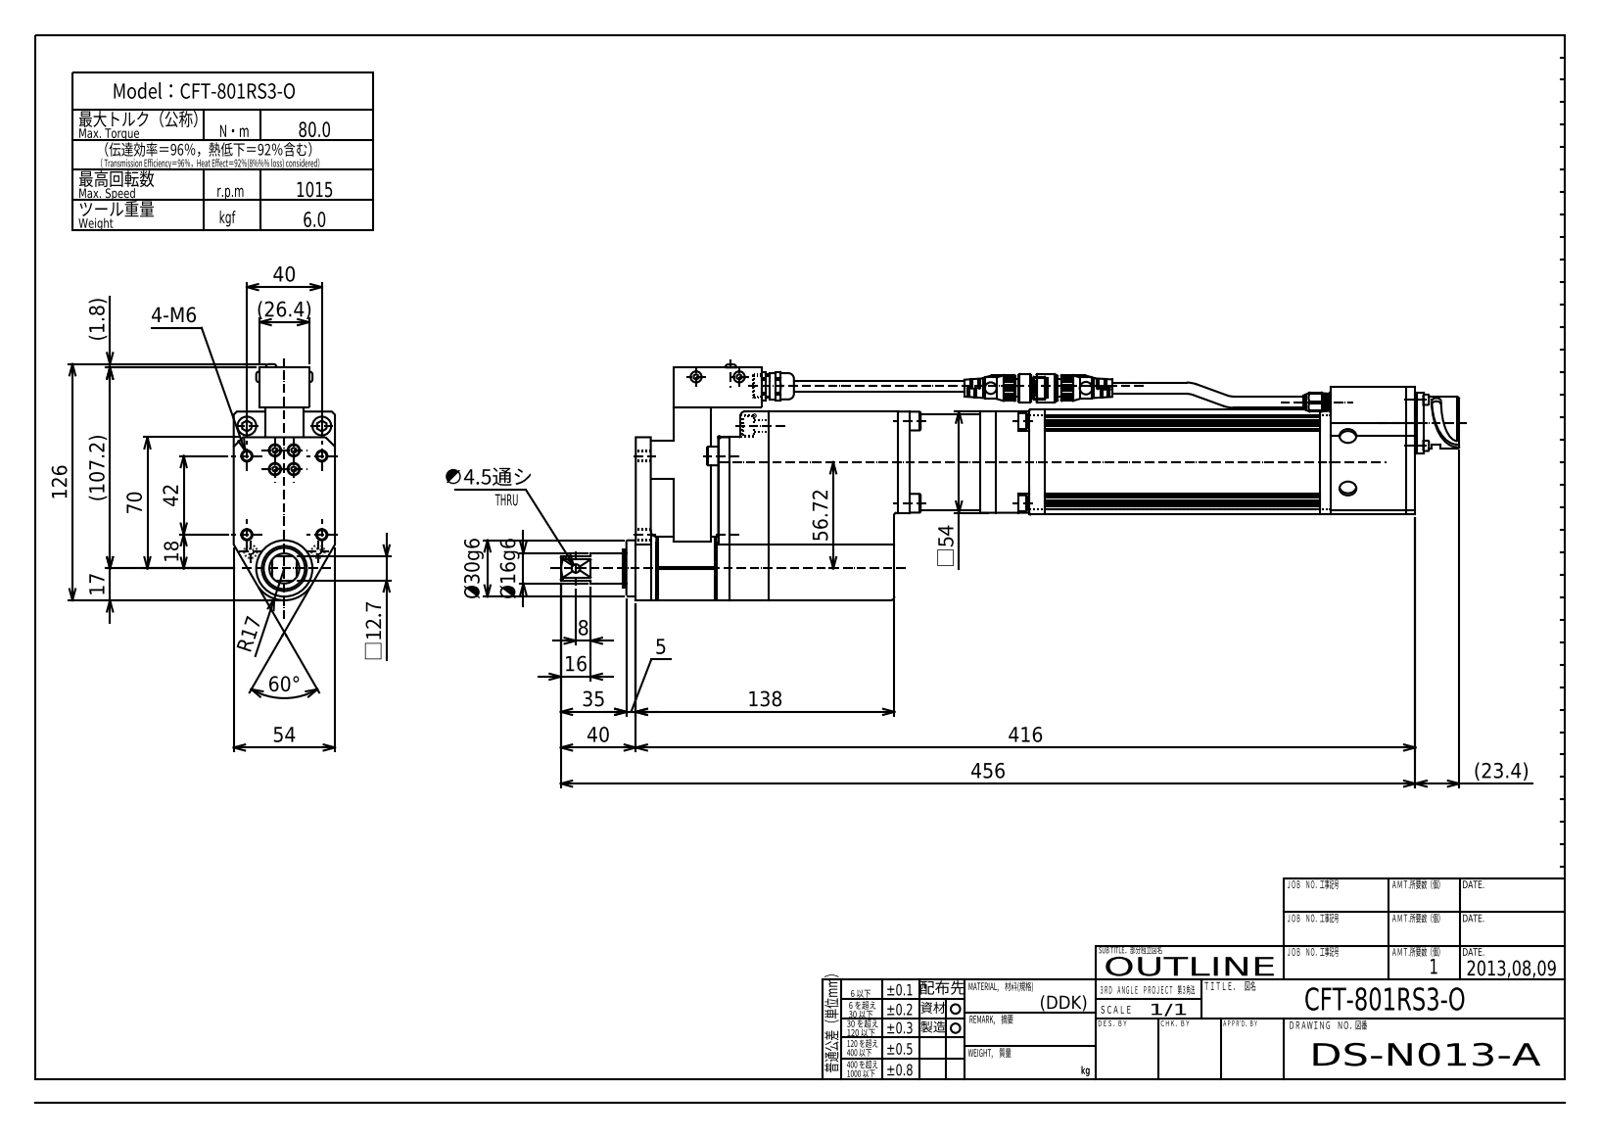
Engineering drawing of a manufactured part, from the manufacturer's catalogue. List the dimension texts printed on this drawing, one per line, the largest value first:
456
416
138
126
(107.2)
70
60°
56.72
54
□54
42
40
40
35
Ø30g6
(26.4)
(23.4)
18
R17
17
16
Ø16g6
□12.7
8
4-M6
5
∅4.5通シ
(1.8)
